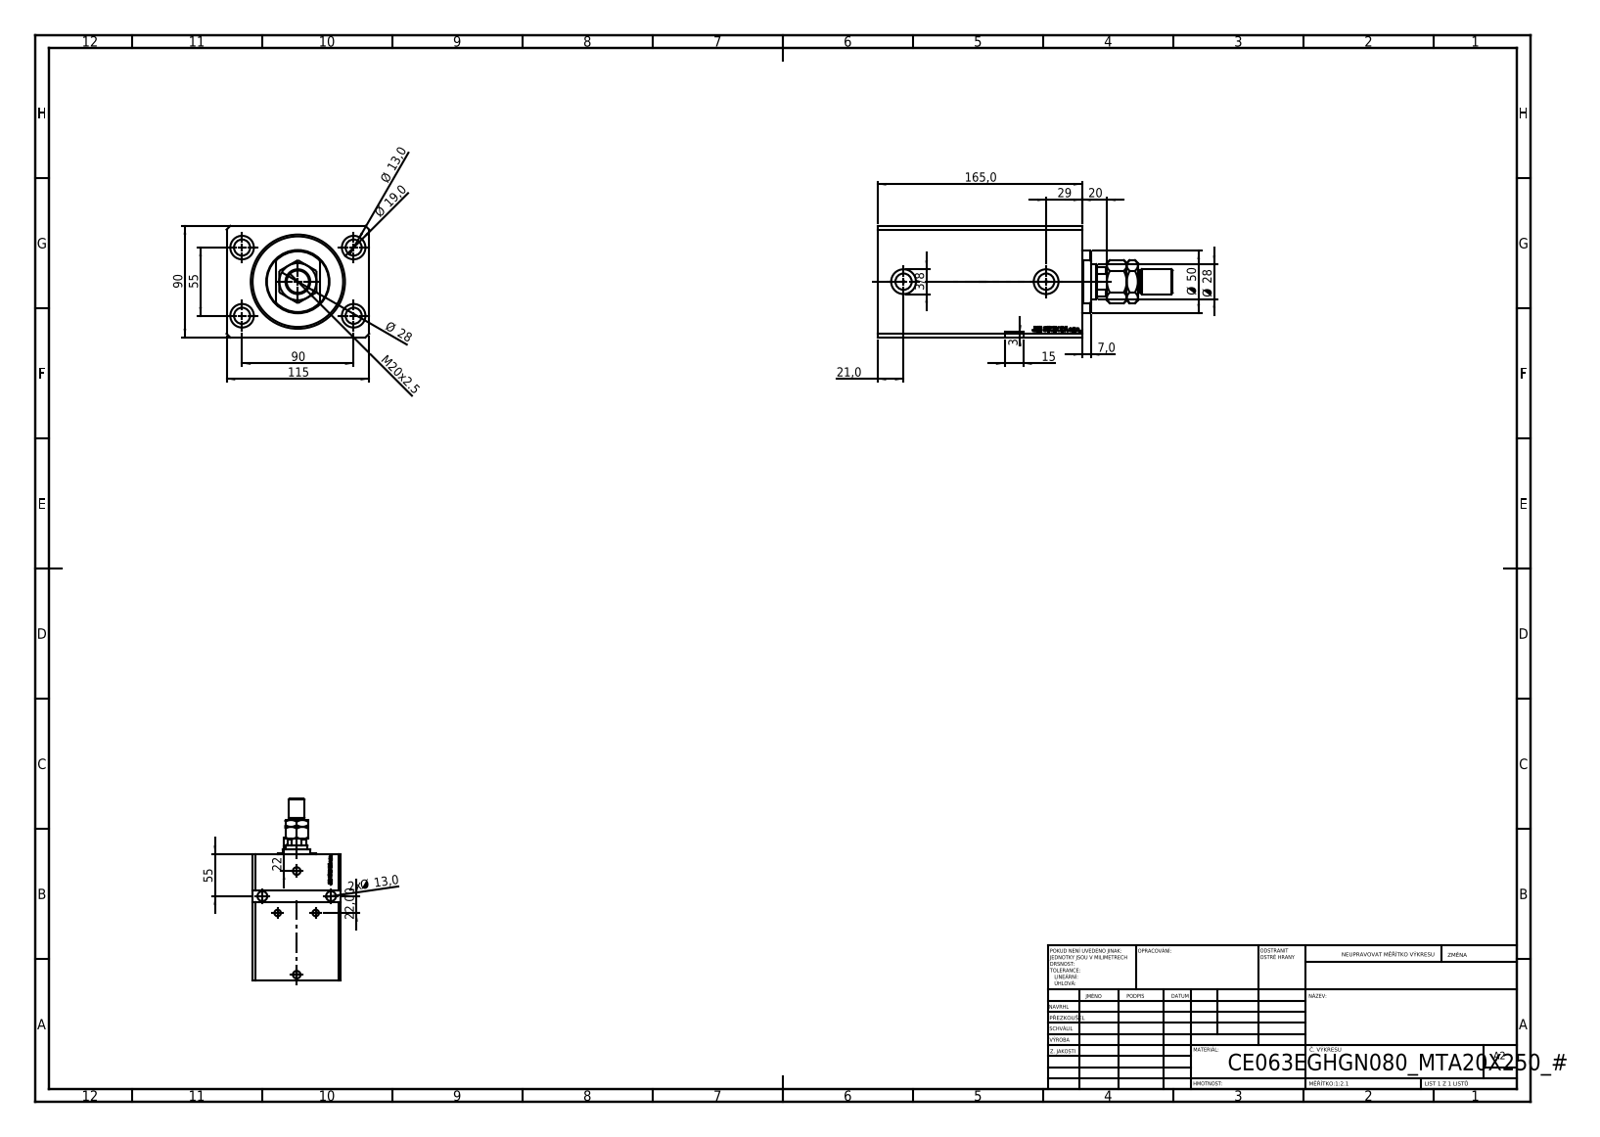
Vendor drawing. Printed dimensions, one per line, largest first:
165,0
115
90
90
55
55
Ø 50
29
Ø 28
Ø 28
22
22,00
21,0
M20x2.5
20
Ø 19,0
15
Ø 13,0
2x Ø 13,0
7,0
3
3/8
